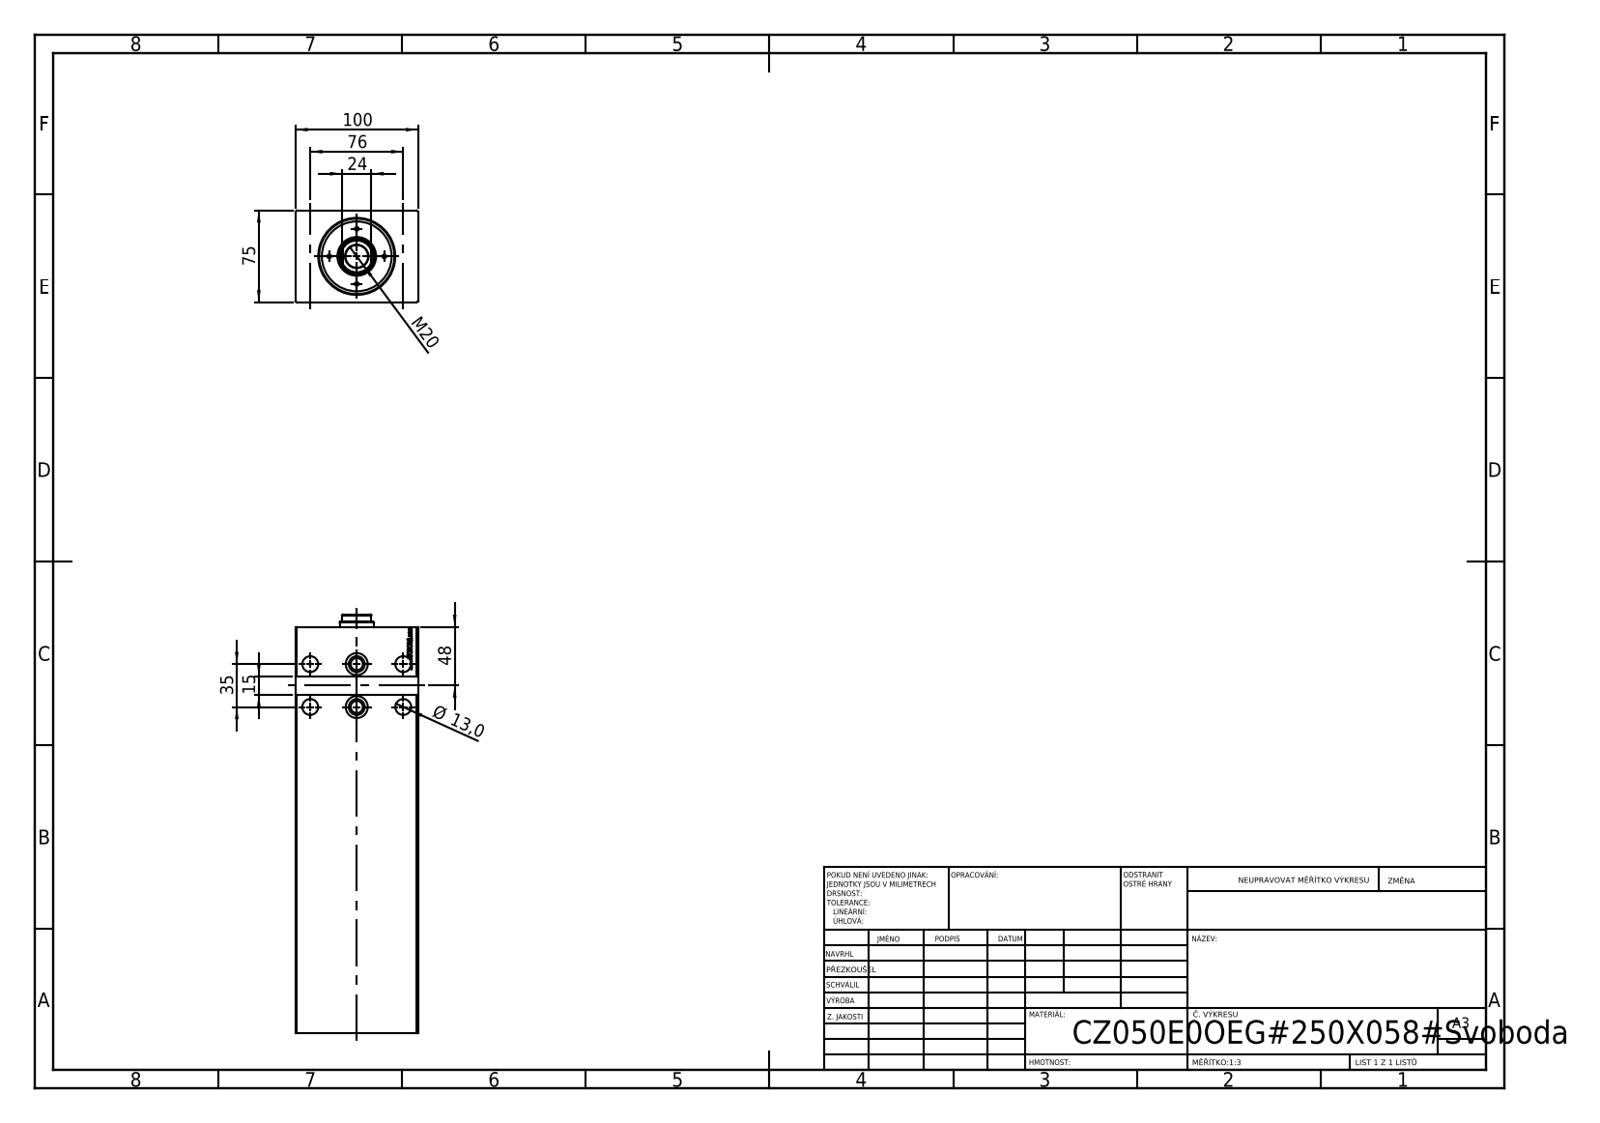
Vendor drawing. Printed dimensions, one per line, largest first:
100
76
75
48
35
24
M20
15
Ø 13,0
